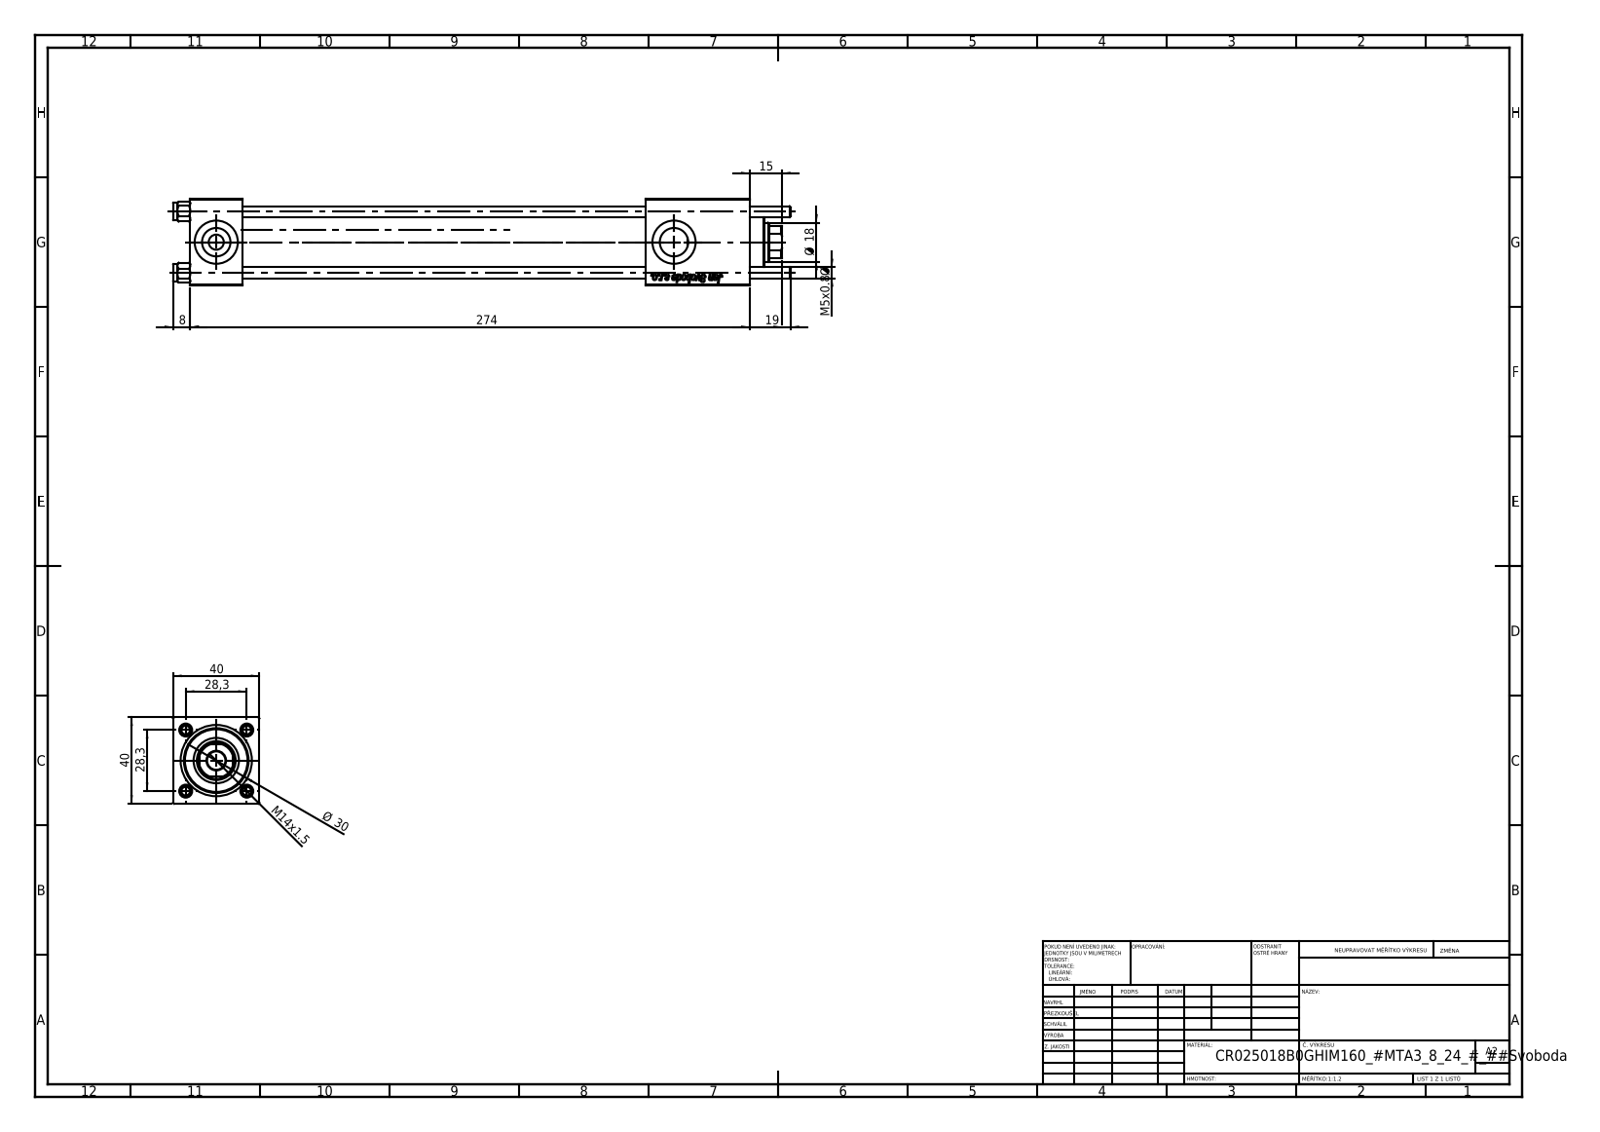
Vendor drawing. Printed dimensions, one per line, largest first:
274
40
40
Ø 30
28,3
28,3
19
Ø 18
15
M14x1.5
8
M5x0.8 Ø
